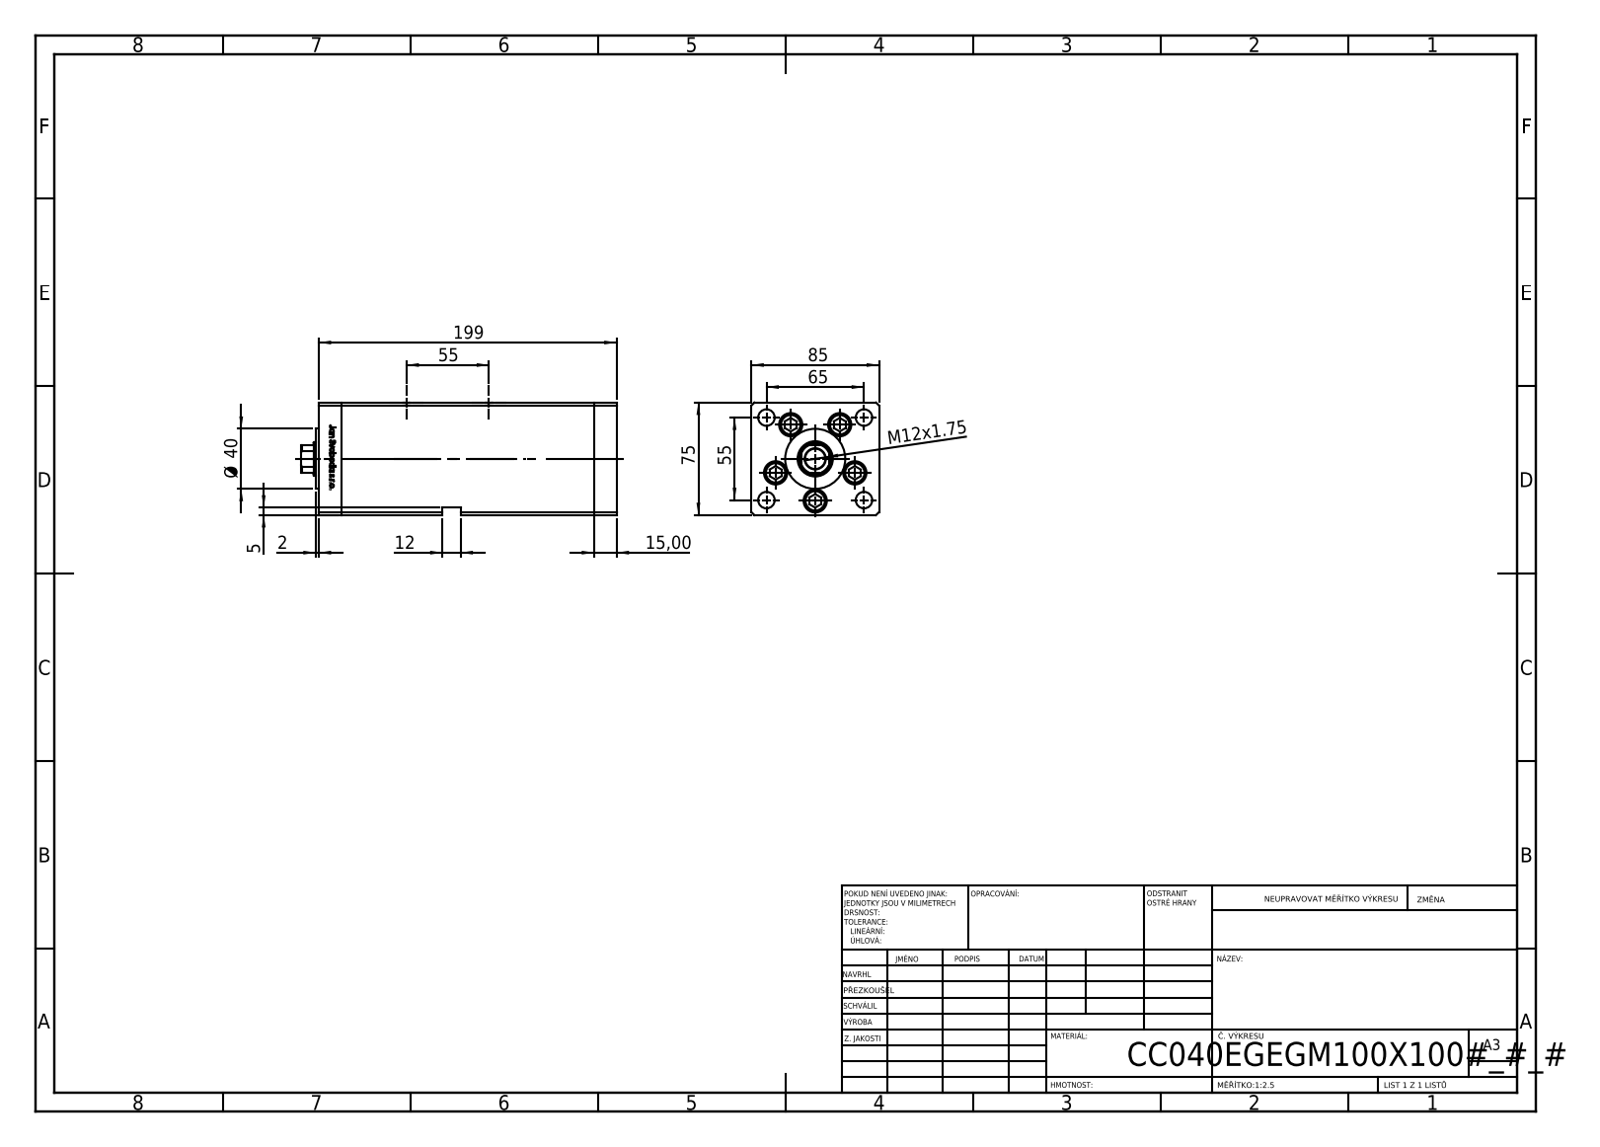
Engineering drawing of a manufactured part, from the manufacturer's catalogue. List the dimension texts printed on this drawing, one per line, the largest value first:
199
85
75
65
55
55
Ø 40
15,00
12
M12x1.75
5
2
